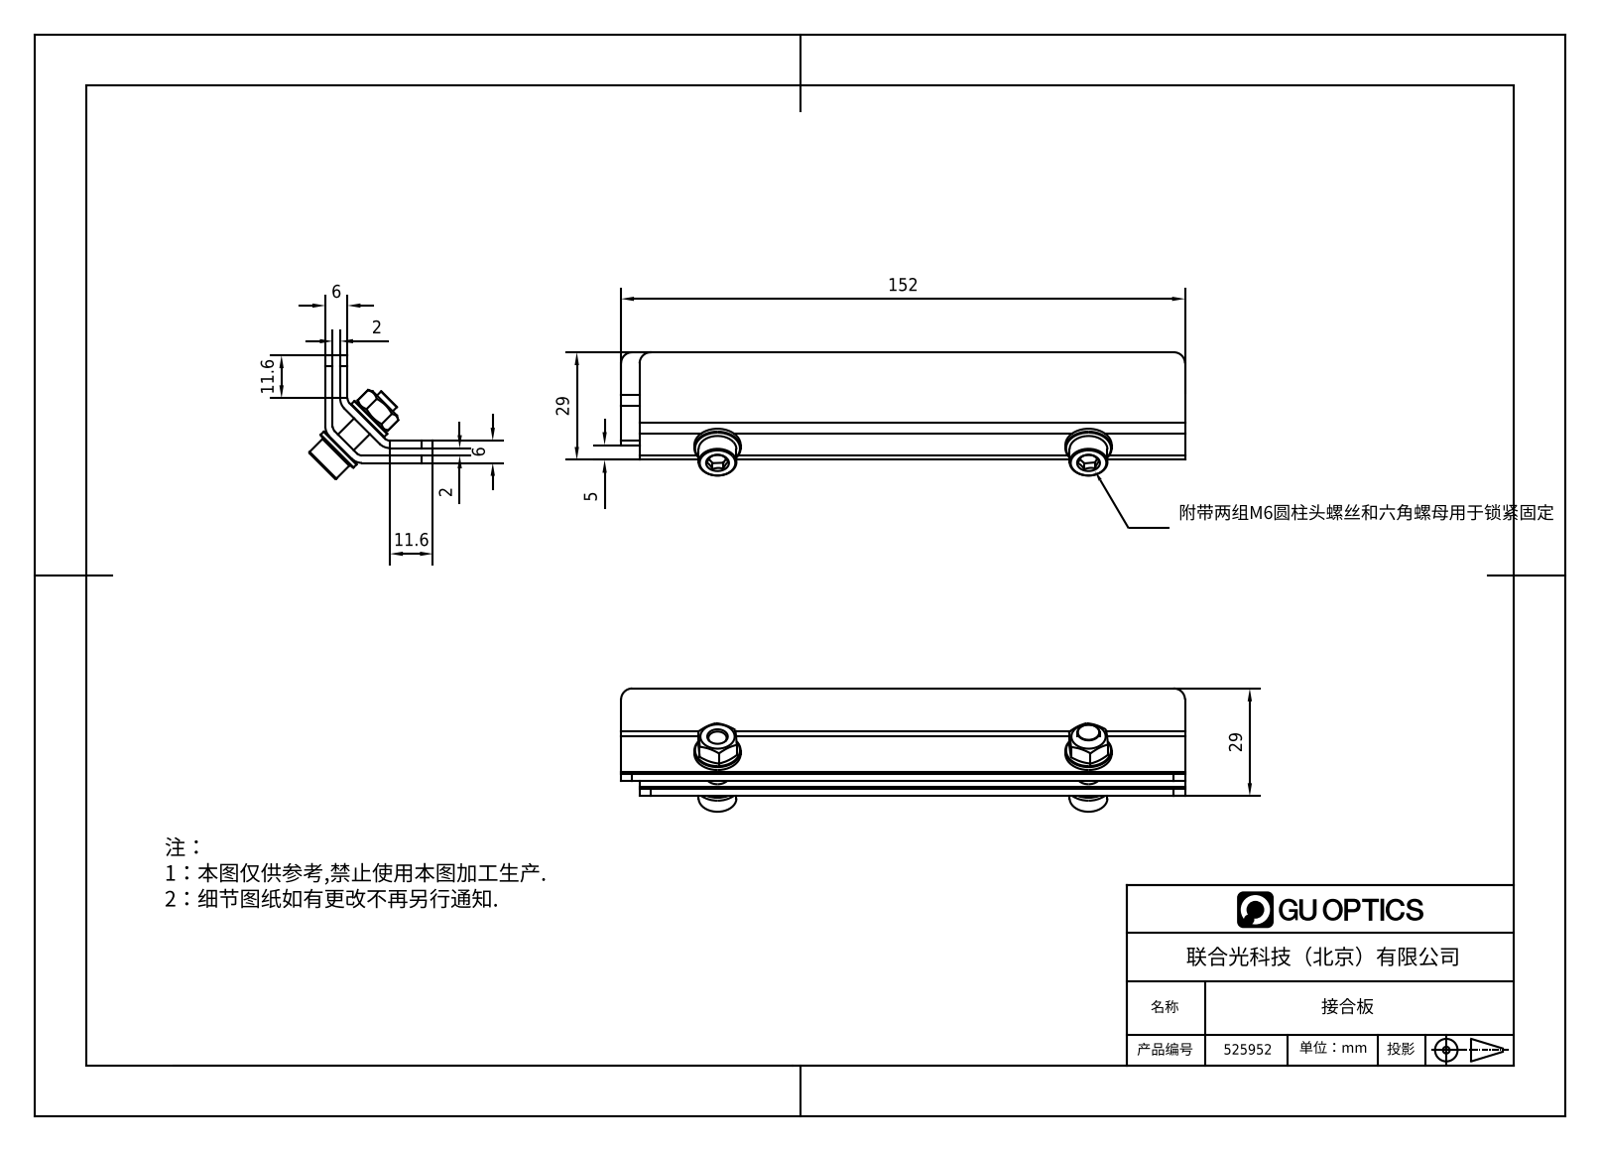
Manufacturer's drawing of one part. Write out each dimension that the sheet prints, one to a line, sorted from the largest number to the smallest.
152
29
29
11.6
11.6
6
6
5
2
2
